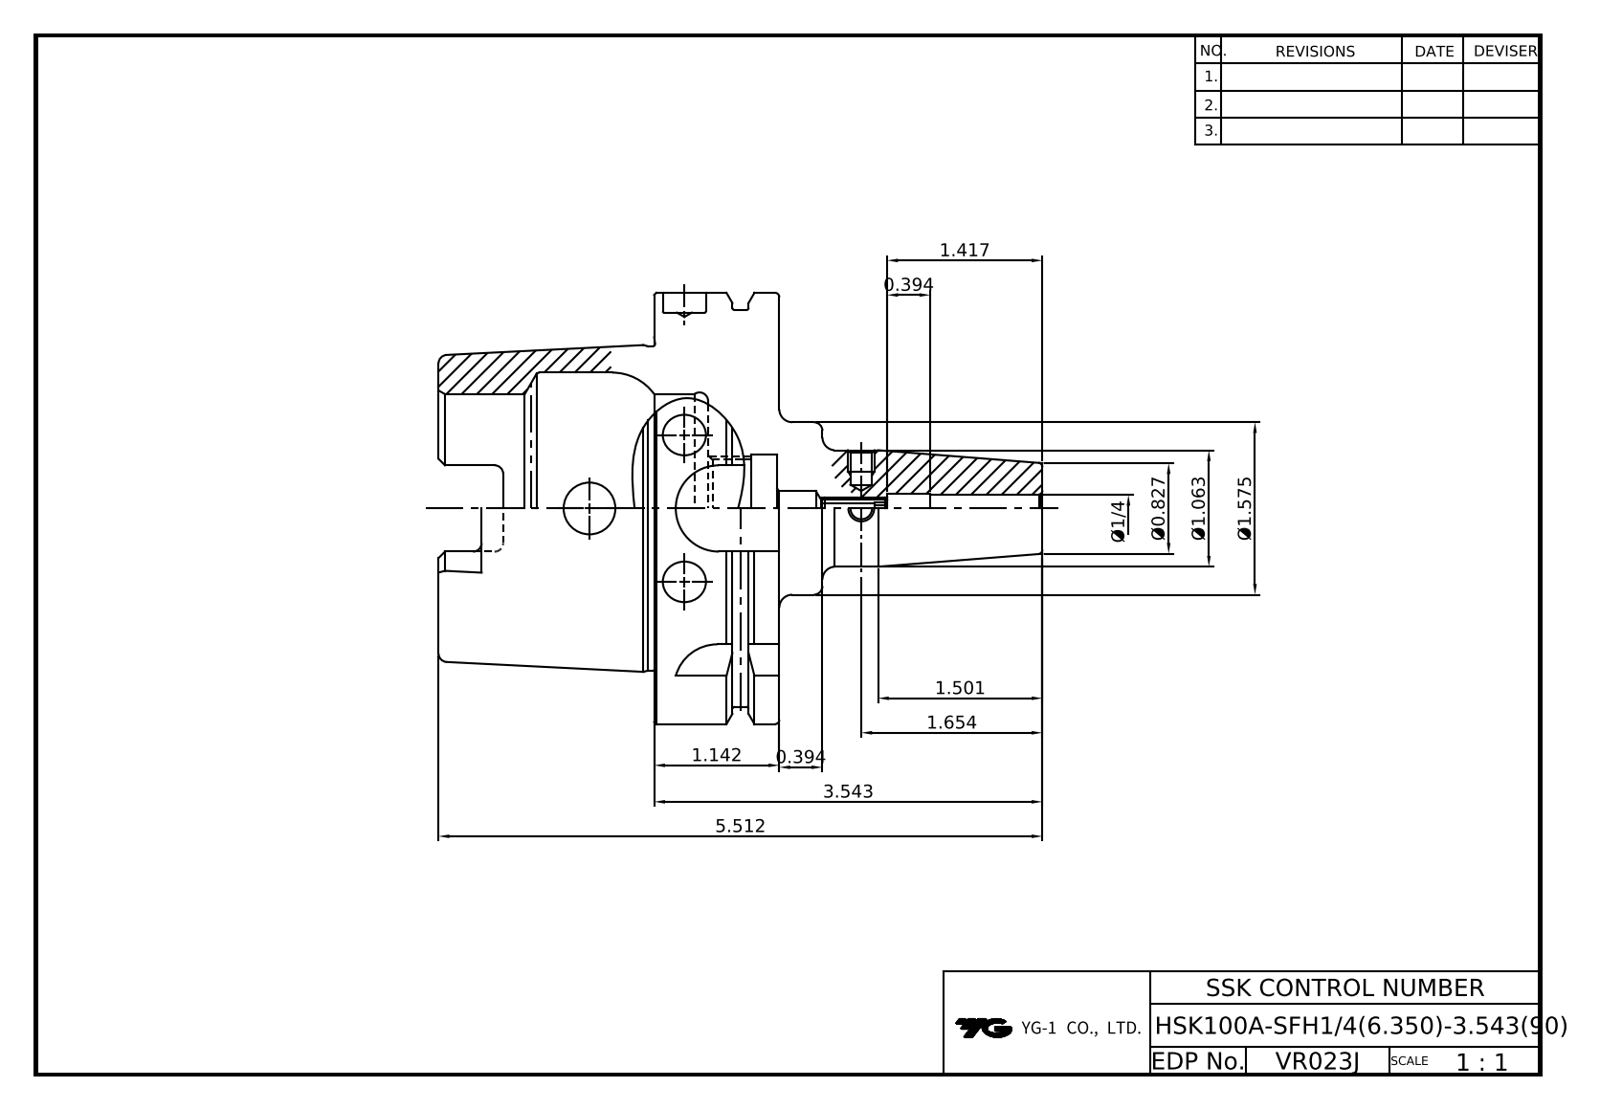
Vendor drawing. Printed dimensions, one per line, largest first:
5.512
3.543
1.654
Ø1.575
1.501
1.417
1.142
Ø1.063
Ø0.827
0.394
0.394
